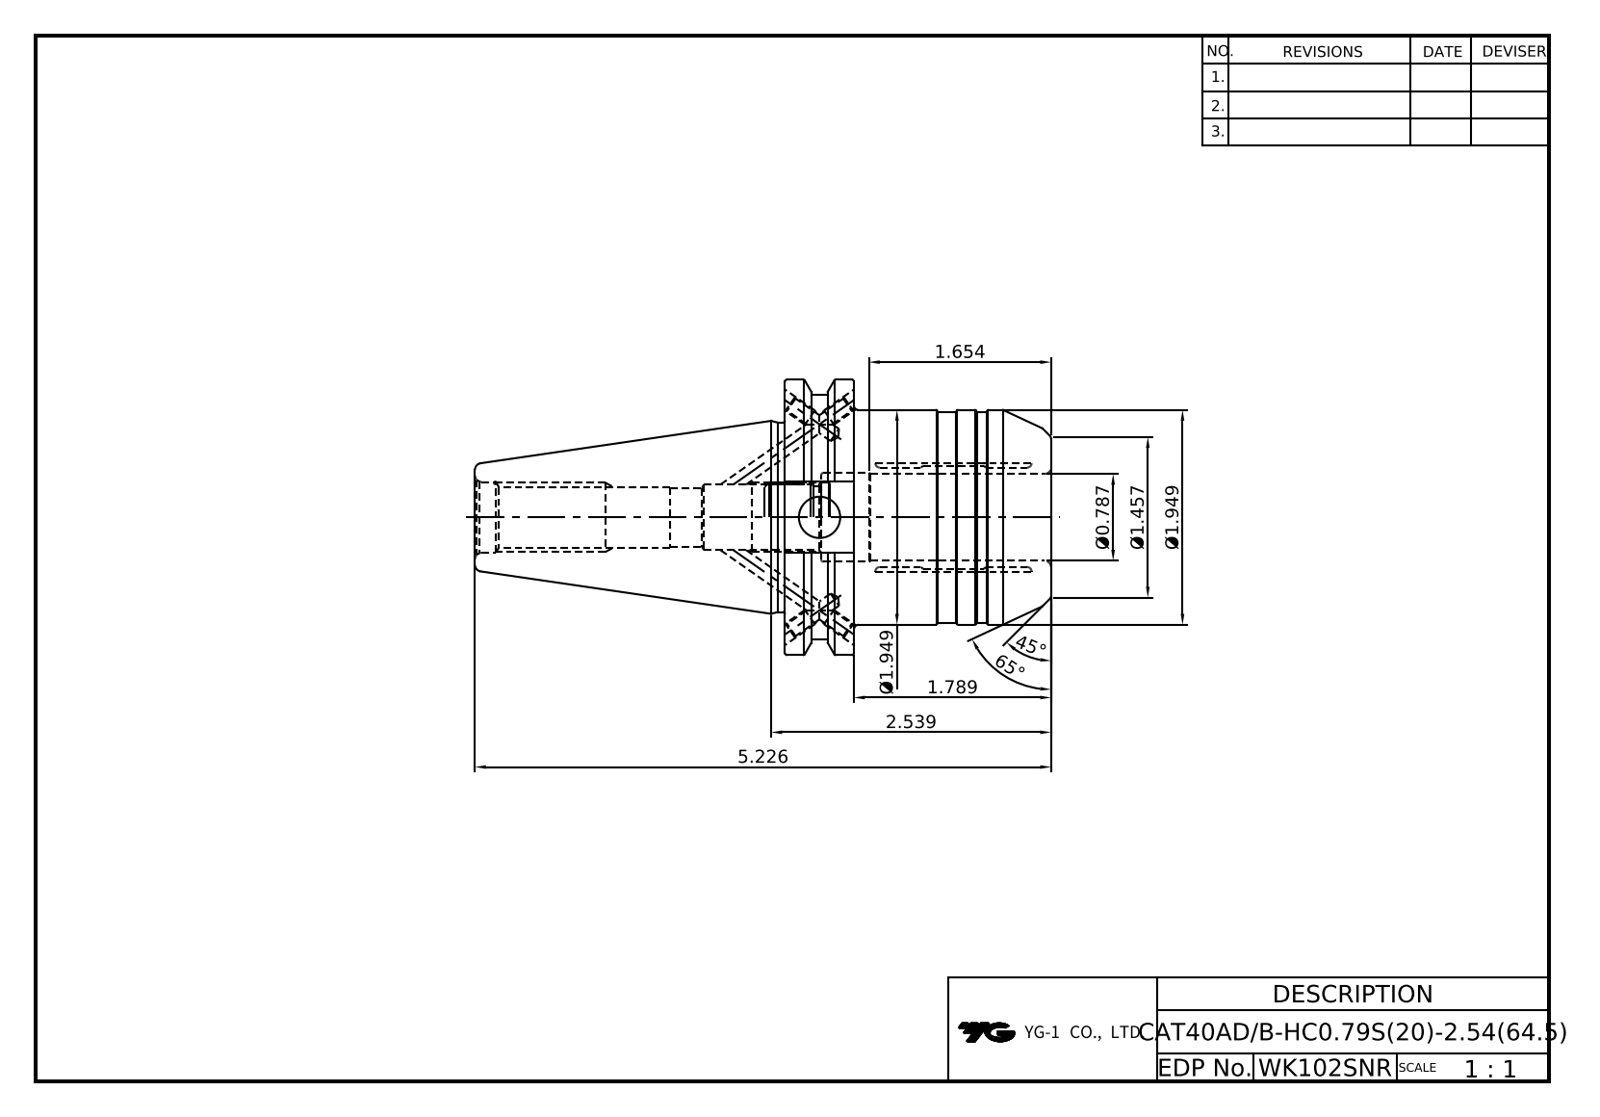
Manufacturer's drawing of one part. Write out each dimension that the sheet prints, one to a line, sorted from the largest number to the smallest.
65°
45°
5.226
2.539
Ø1.949
Ø1.949
1.789
1.654
Ø1.457
Ø0.787
